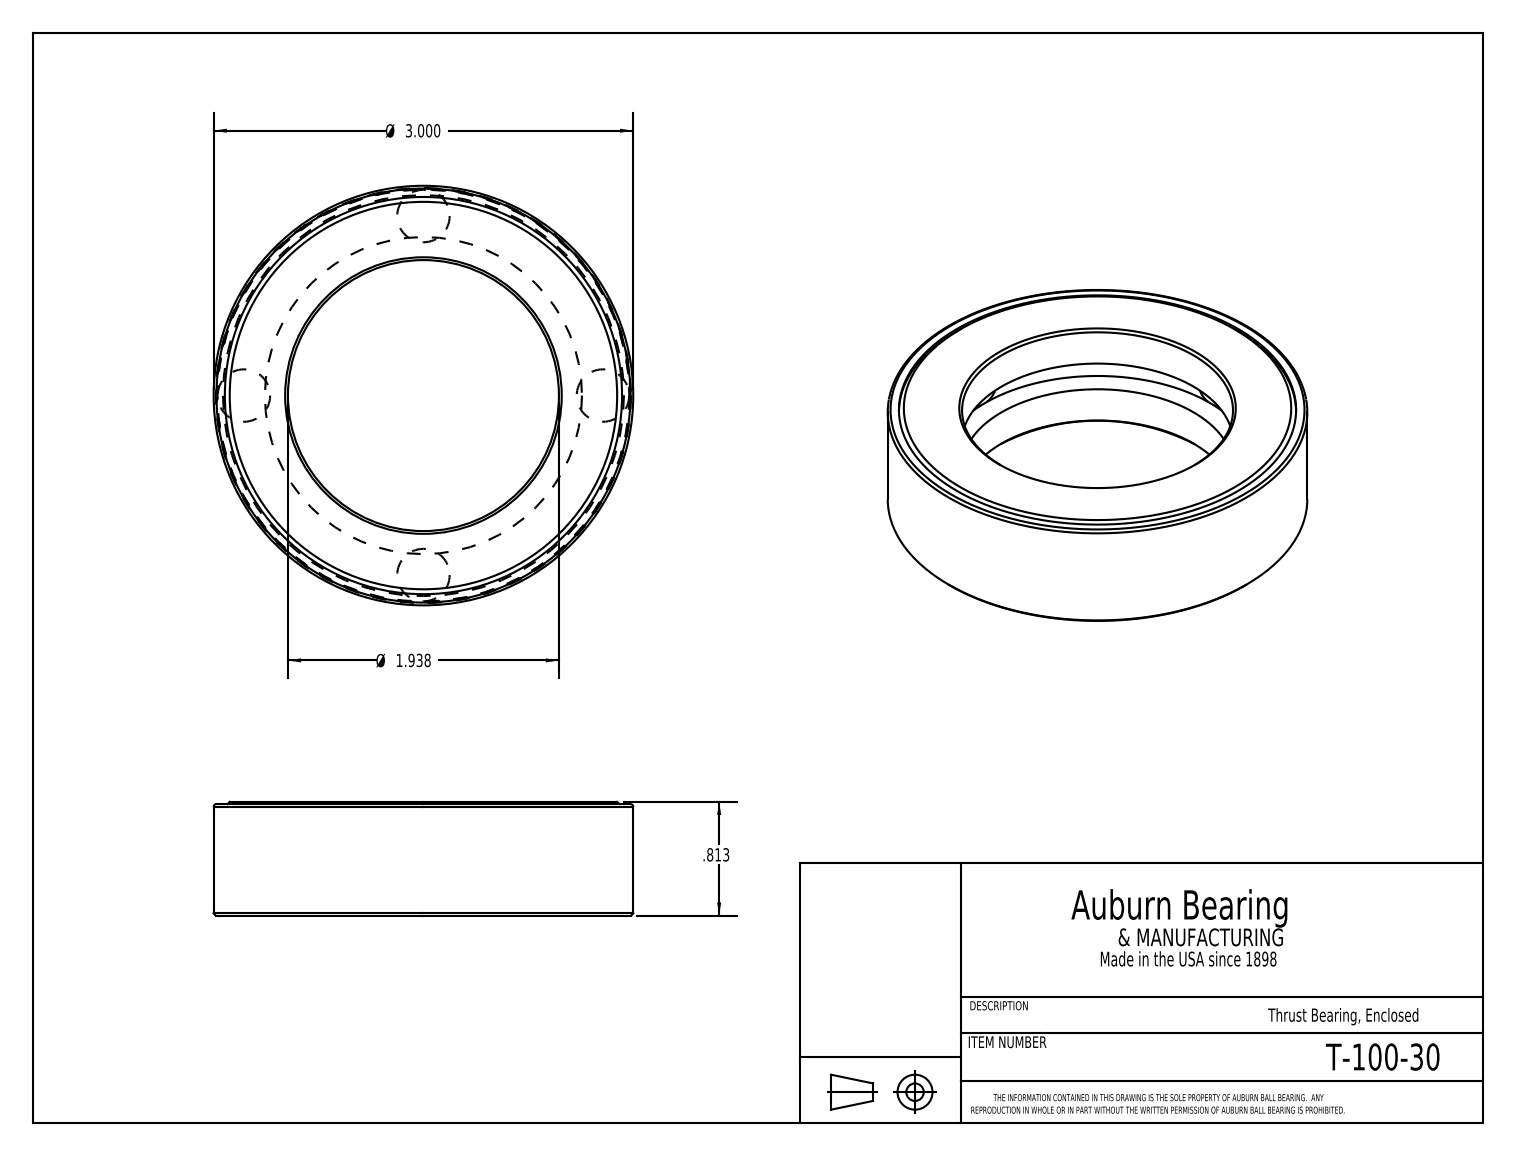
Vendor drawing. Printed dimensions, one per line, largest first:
Ø 3.000
Ø 1.938
.813
